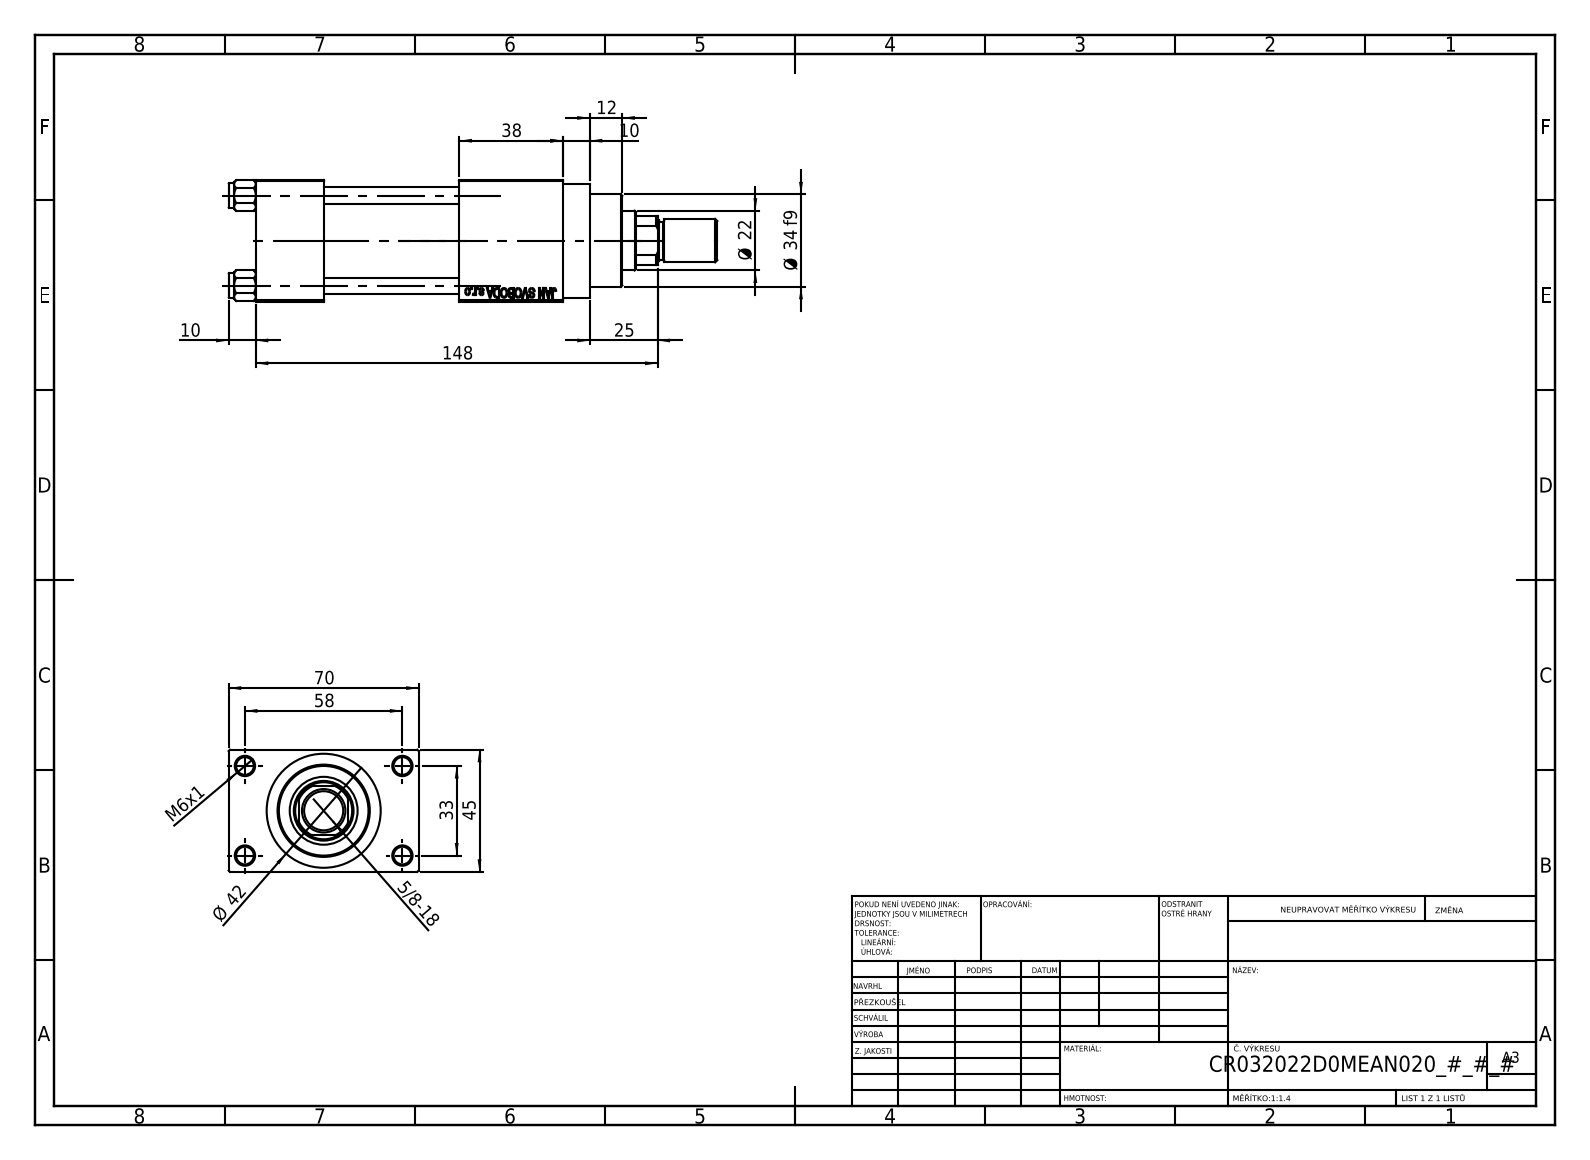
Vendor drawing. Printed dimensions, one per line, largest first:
148
70
58
45
Ø 42
38
Ø 34 f9
33
25
Ø 22
12
10
10
M6x1
5/8-18
